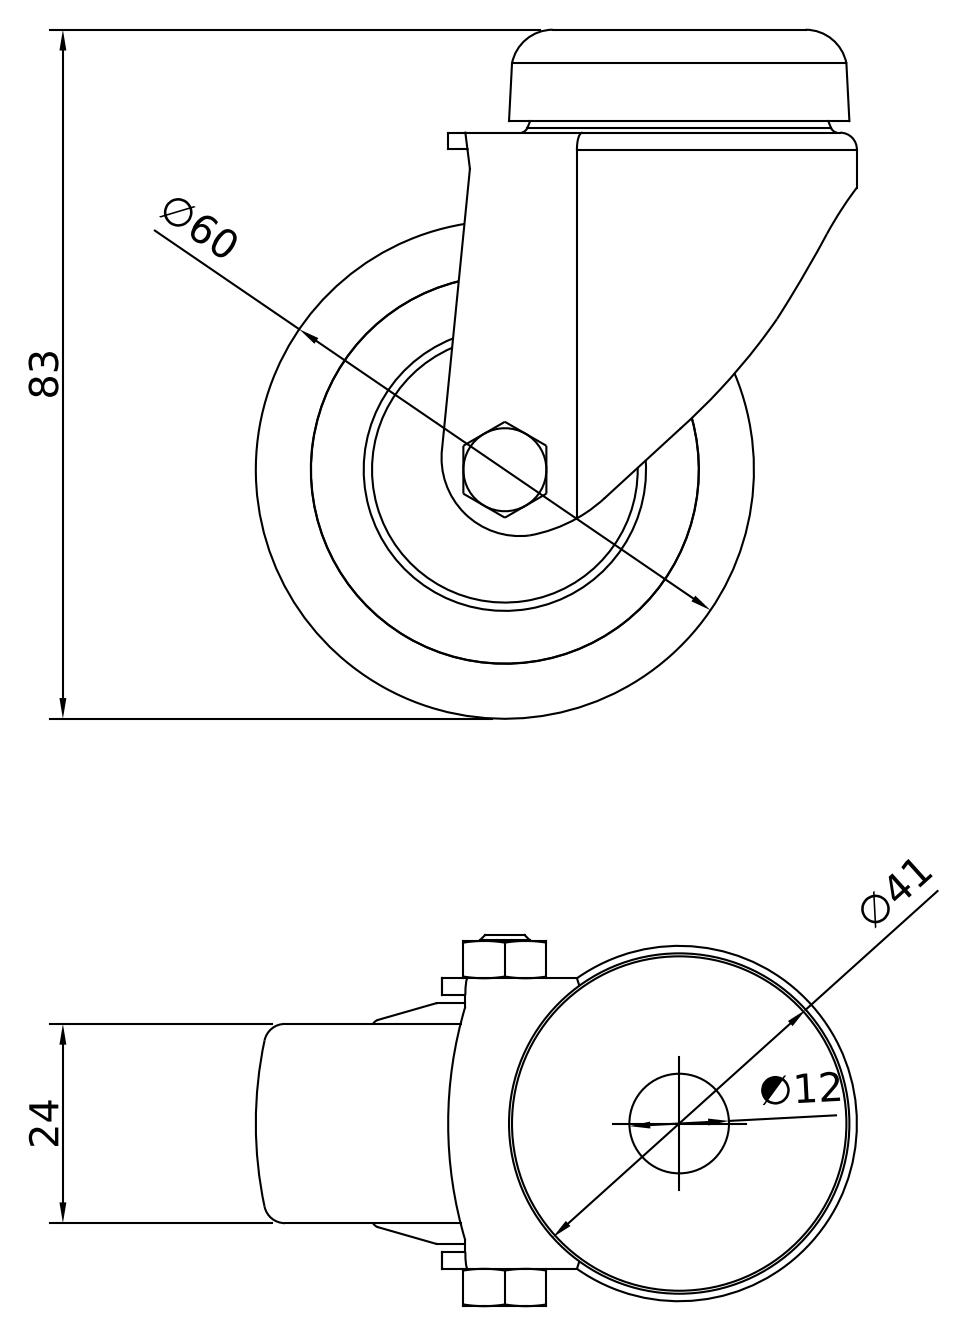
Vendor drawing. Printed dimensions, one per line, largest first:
83
∅60
∅41
24
∅12
